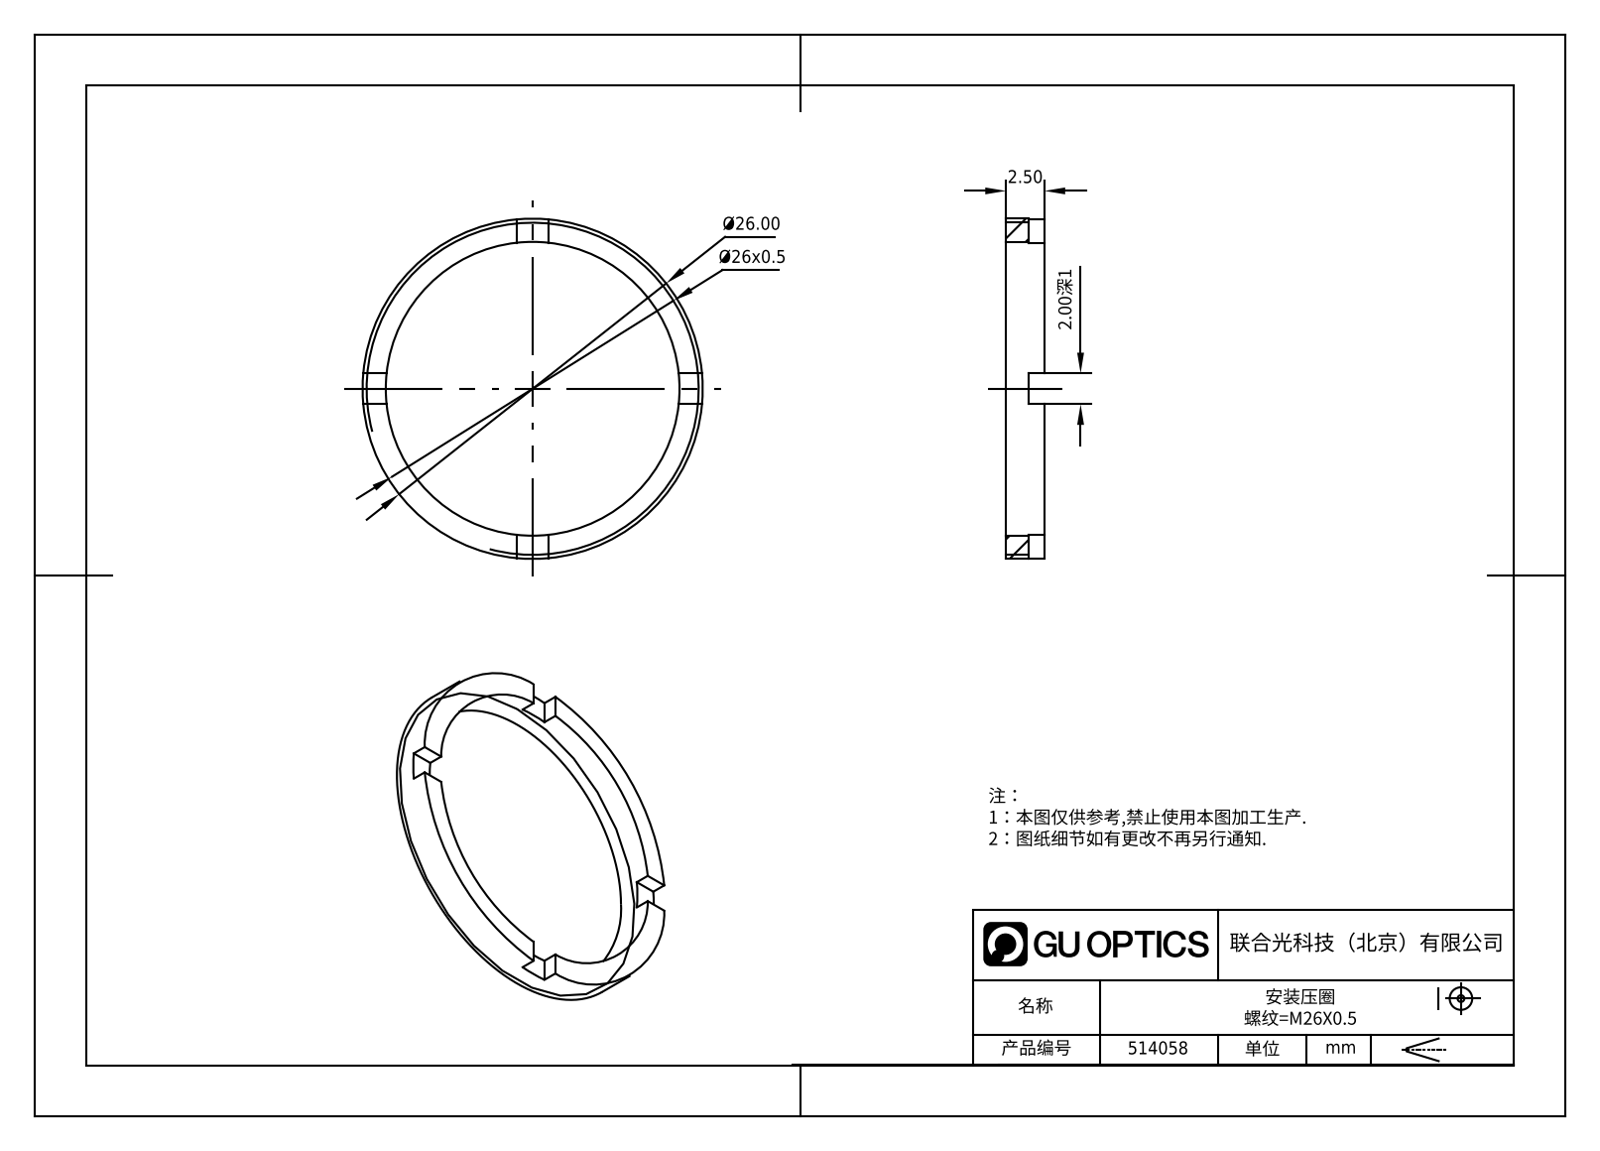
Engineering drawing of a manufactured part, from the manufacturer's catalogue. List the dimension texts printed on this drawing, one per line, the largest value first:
Ø26.00
Ø26x0.5
2.50
2.00深1
